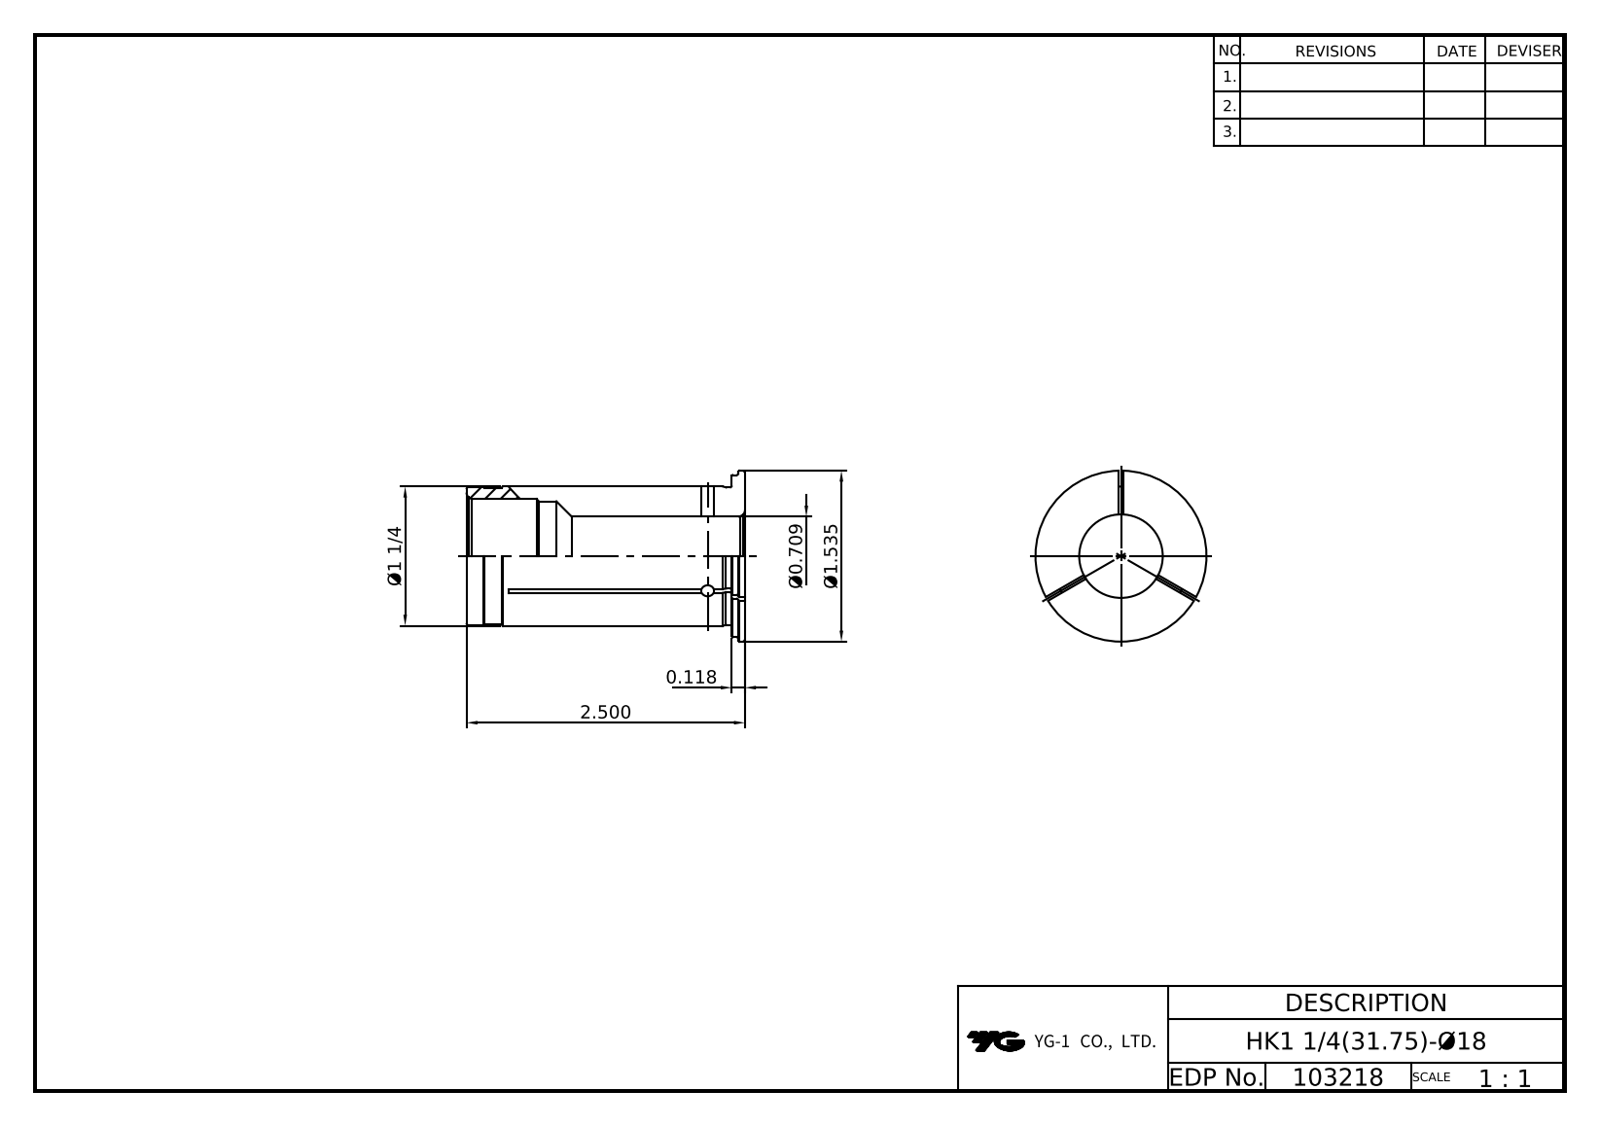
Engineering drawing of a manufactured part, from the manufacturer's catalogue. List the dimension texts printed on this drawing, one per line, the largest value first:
2.500
Ø1.535
Ø1 1/4
0.118
